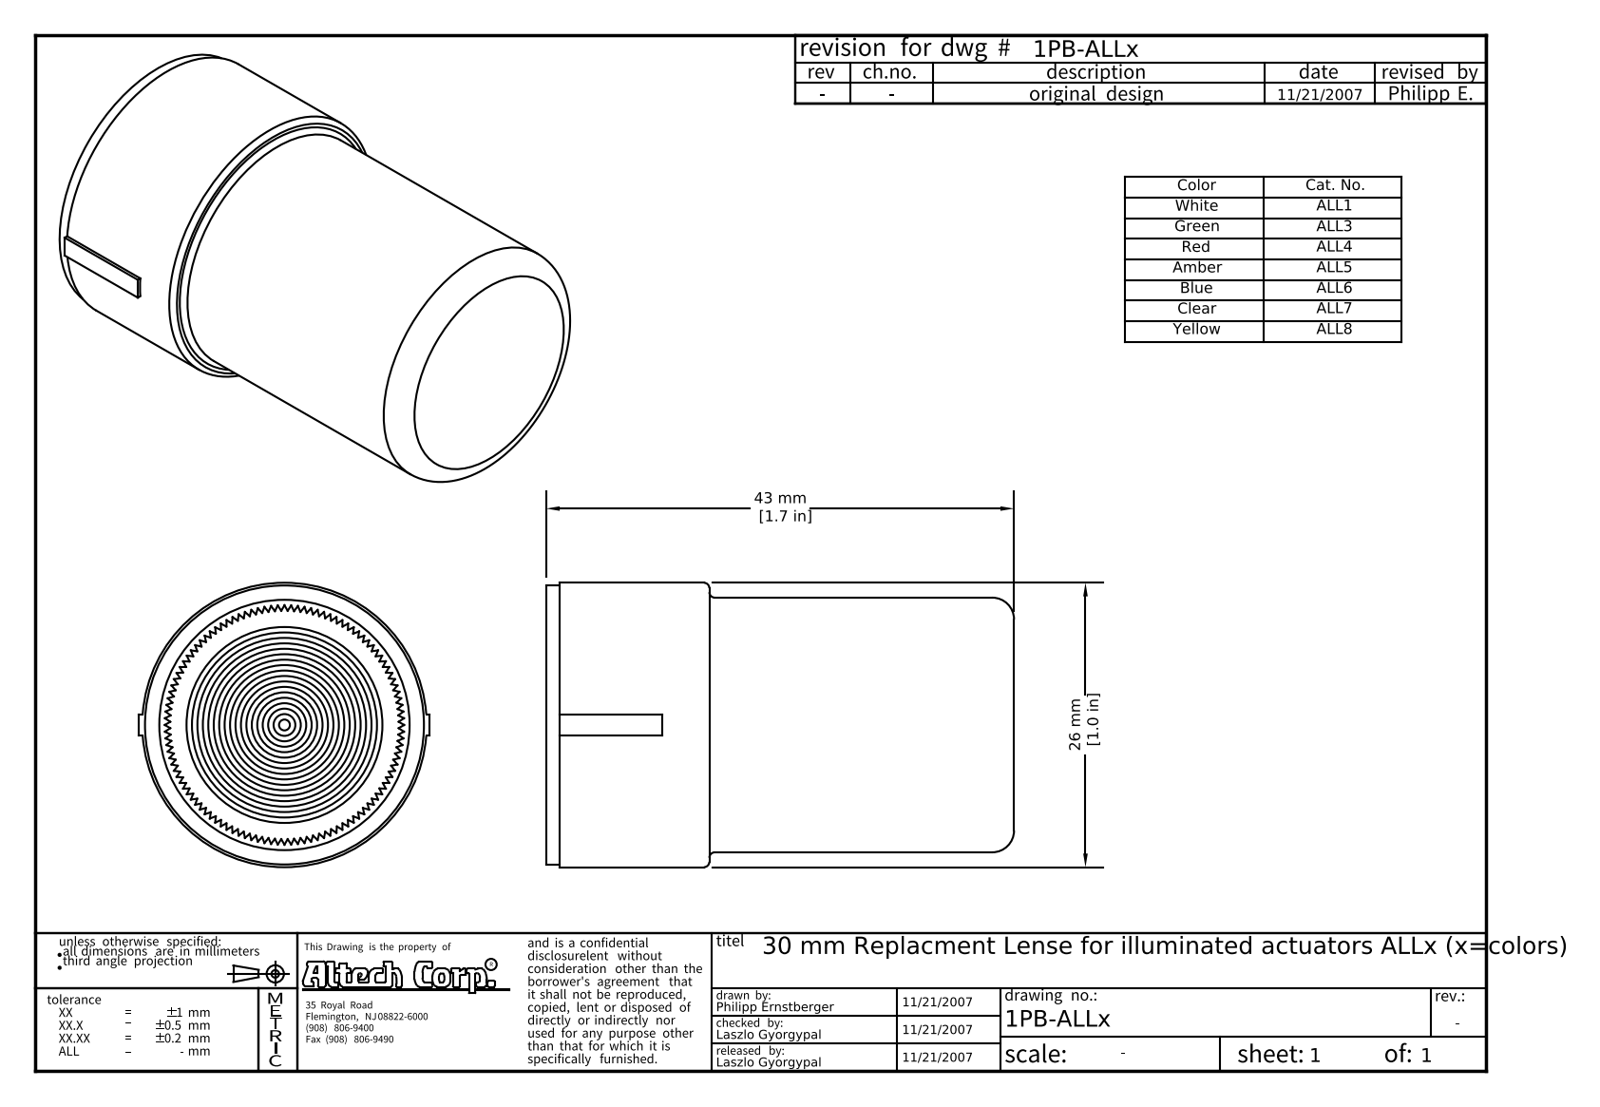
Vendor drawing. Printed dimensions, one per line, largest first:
43 mm [1.7 in]
26 mm [1.0 in]
